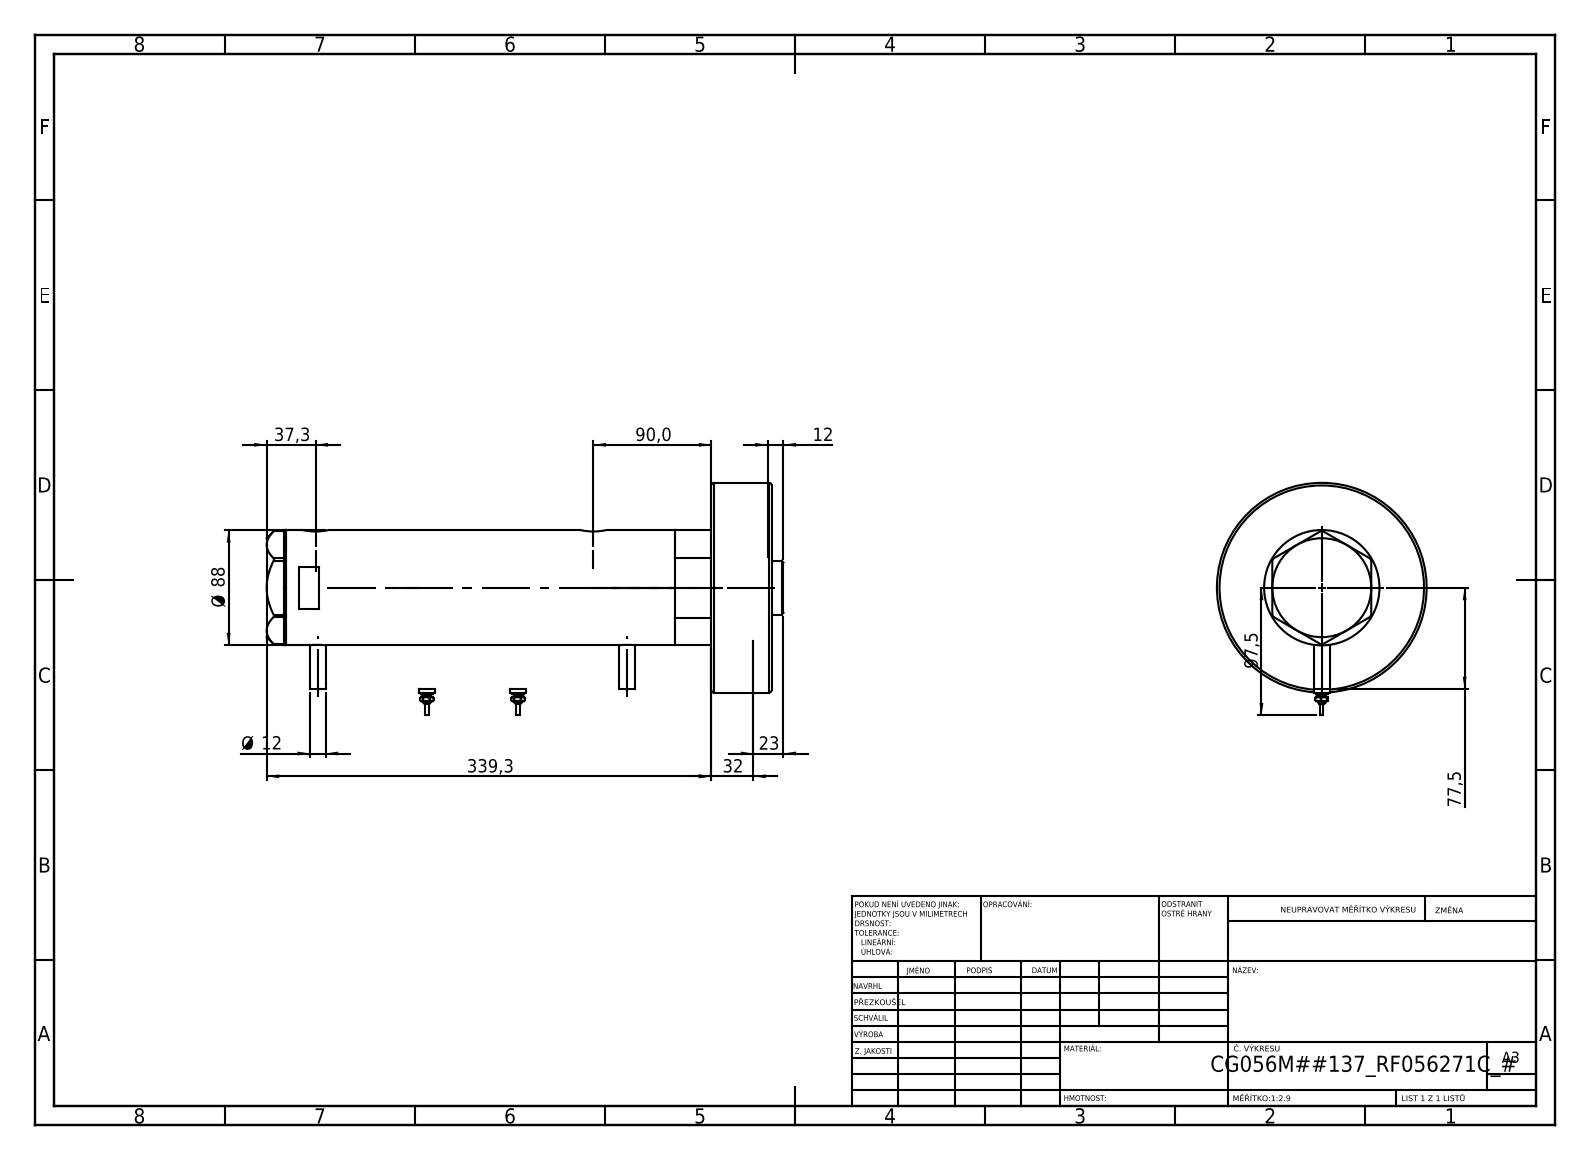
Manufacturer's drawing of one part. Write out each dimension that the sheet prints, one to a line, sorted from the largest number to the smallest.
339,3
97,5
90,0
Ø 88
77,5
37,3
32
23
12
Ø 12
